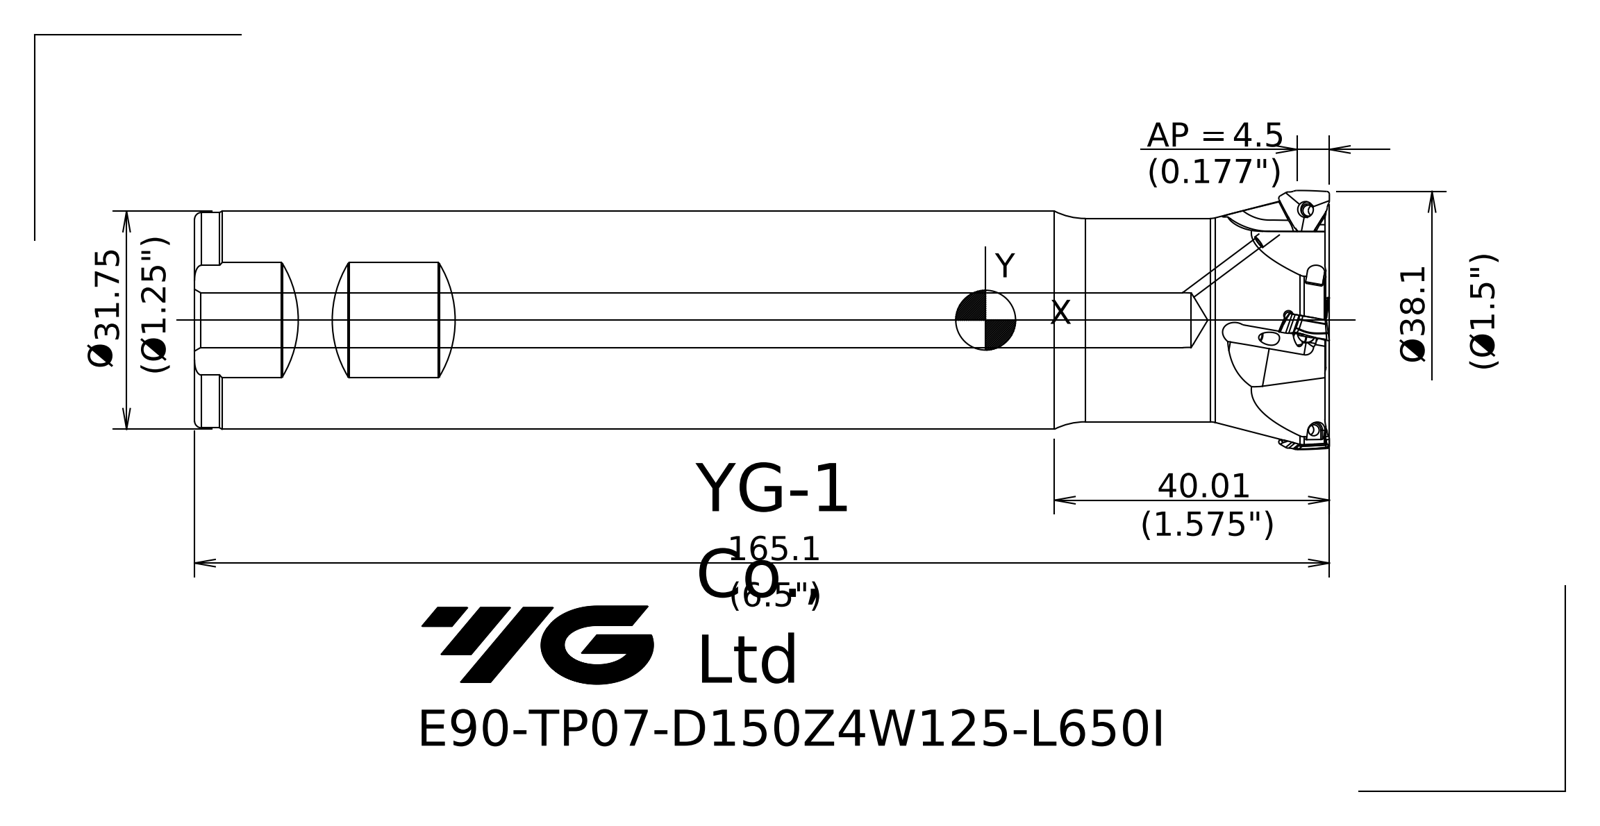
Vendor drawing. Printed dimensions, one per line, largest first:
165.1
40.01
Ø38.1
4.5 AP =
